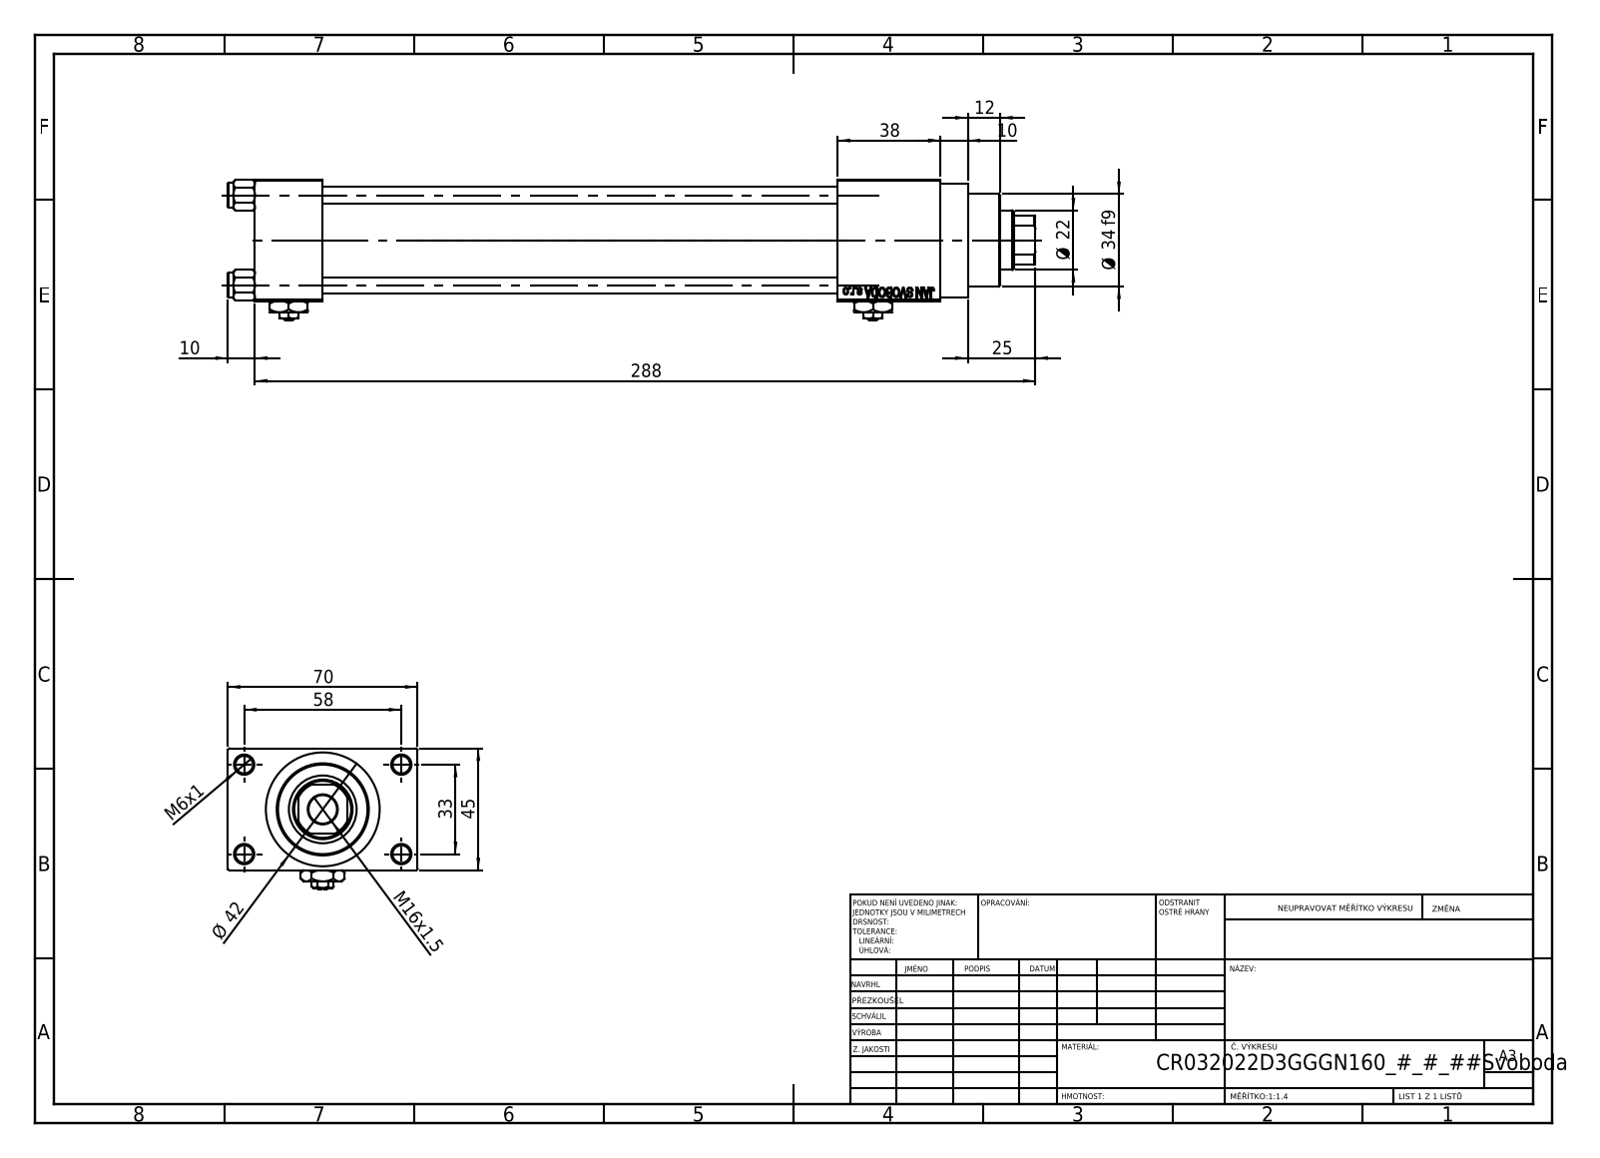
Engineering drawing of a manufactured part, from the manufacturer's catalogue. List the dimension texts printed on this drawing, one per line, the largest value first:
288
70
58
45
Ø 42
38
Ø 34 f9
33
25
Ø 22
M16x1.5
12
10
10
M6x1
